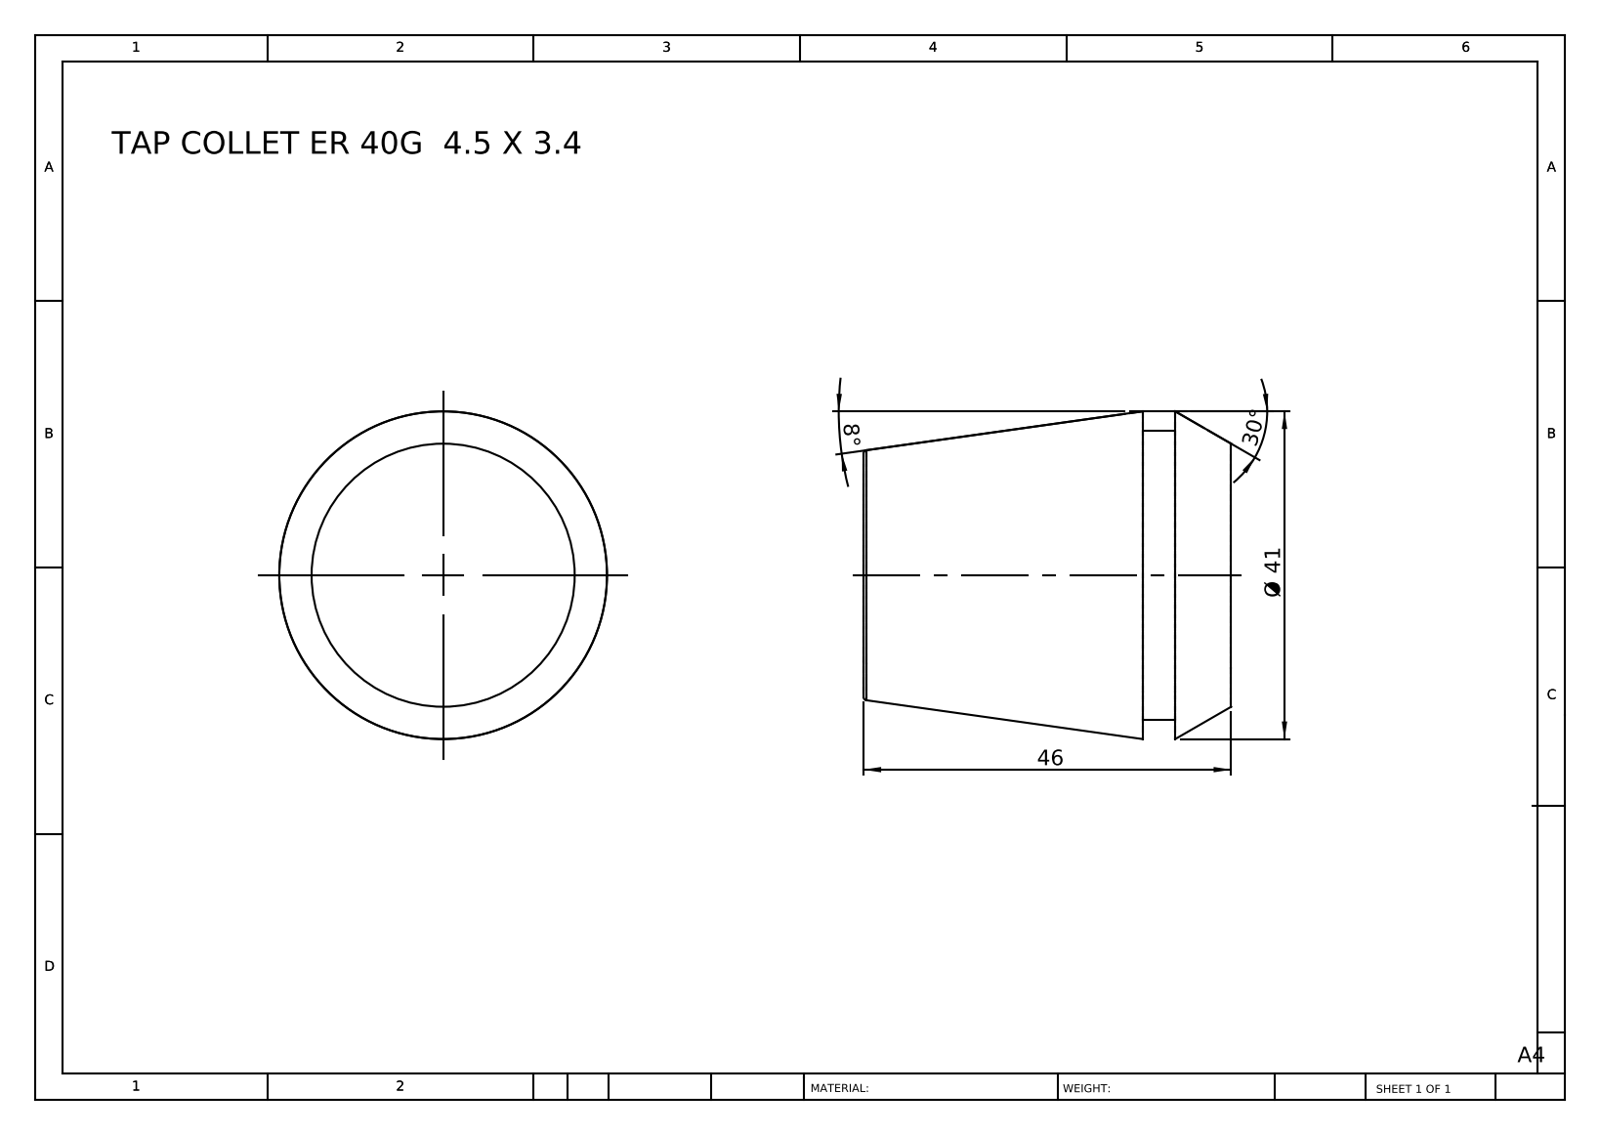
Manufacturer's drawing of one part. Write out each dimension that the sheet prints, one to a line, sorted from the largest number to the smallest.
46
Ø 41
30°
8°
